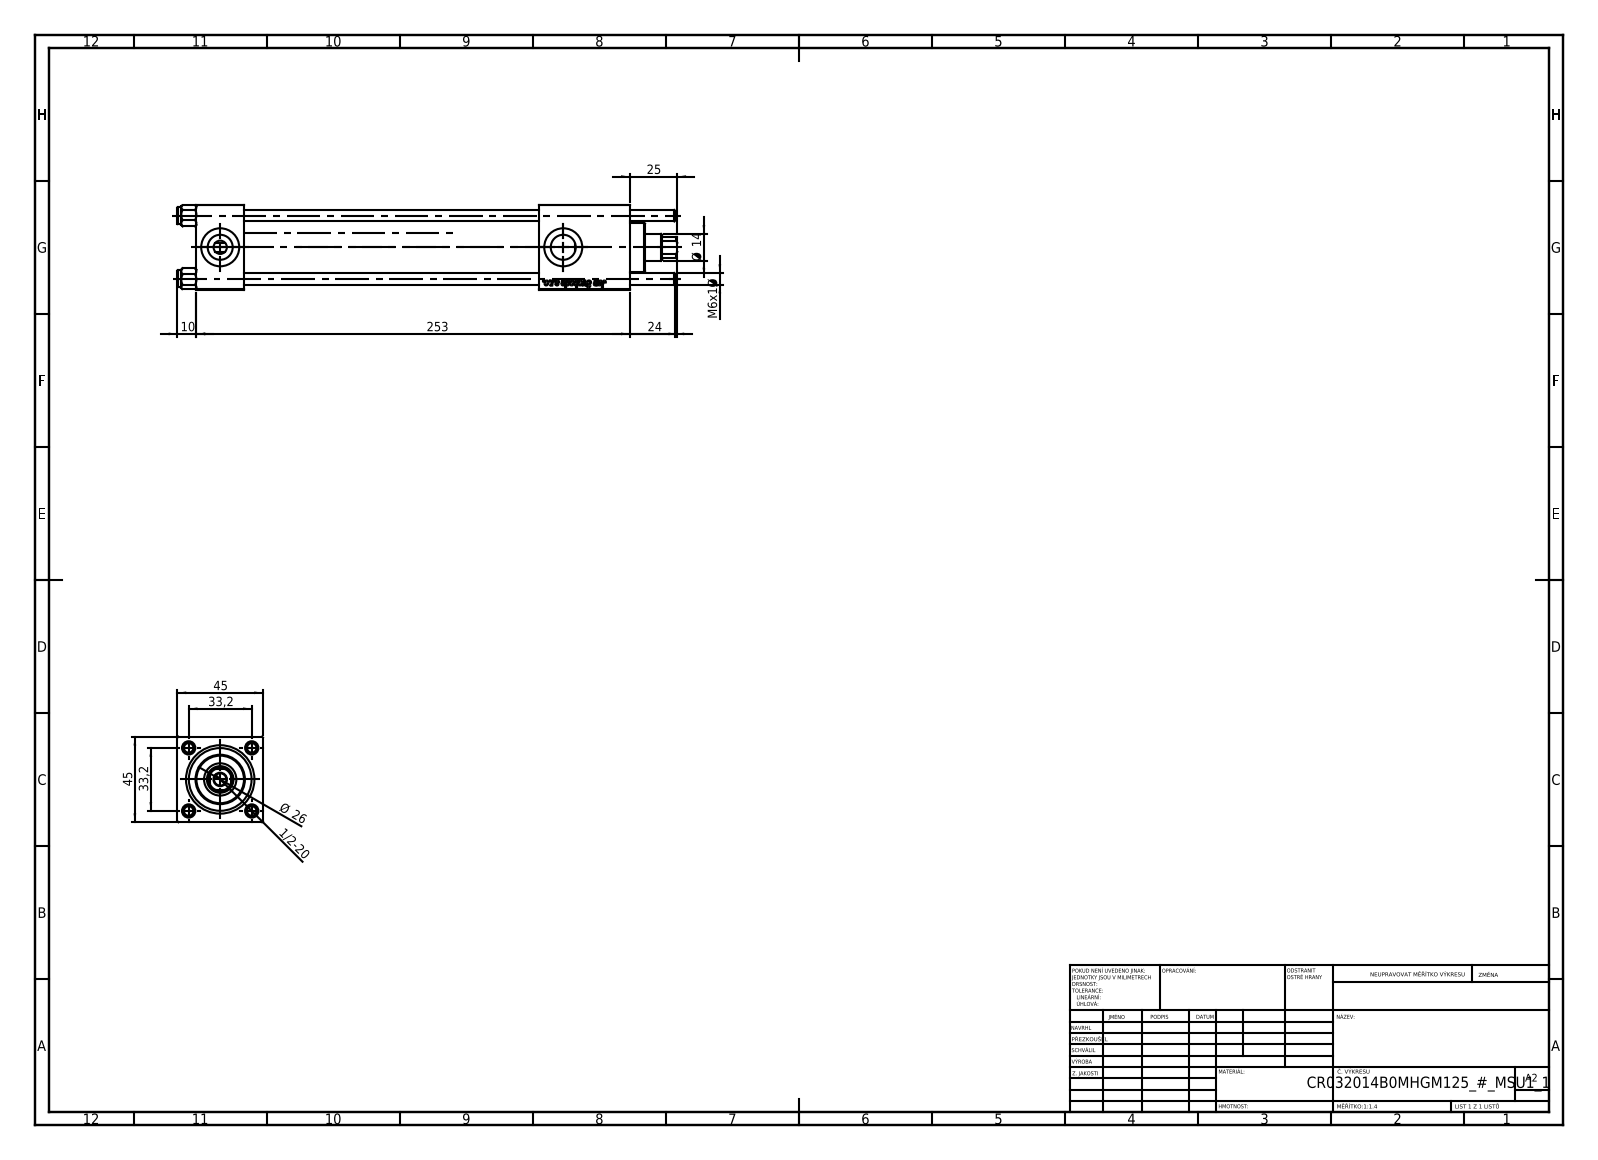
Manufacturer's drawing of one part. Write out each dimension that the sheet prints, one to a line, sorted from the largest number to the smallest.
253
45
45
33,2
33,2
Ø 26
25
24
Ø 14
10
M6x1 Ø
1/2-20
